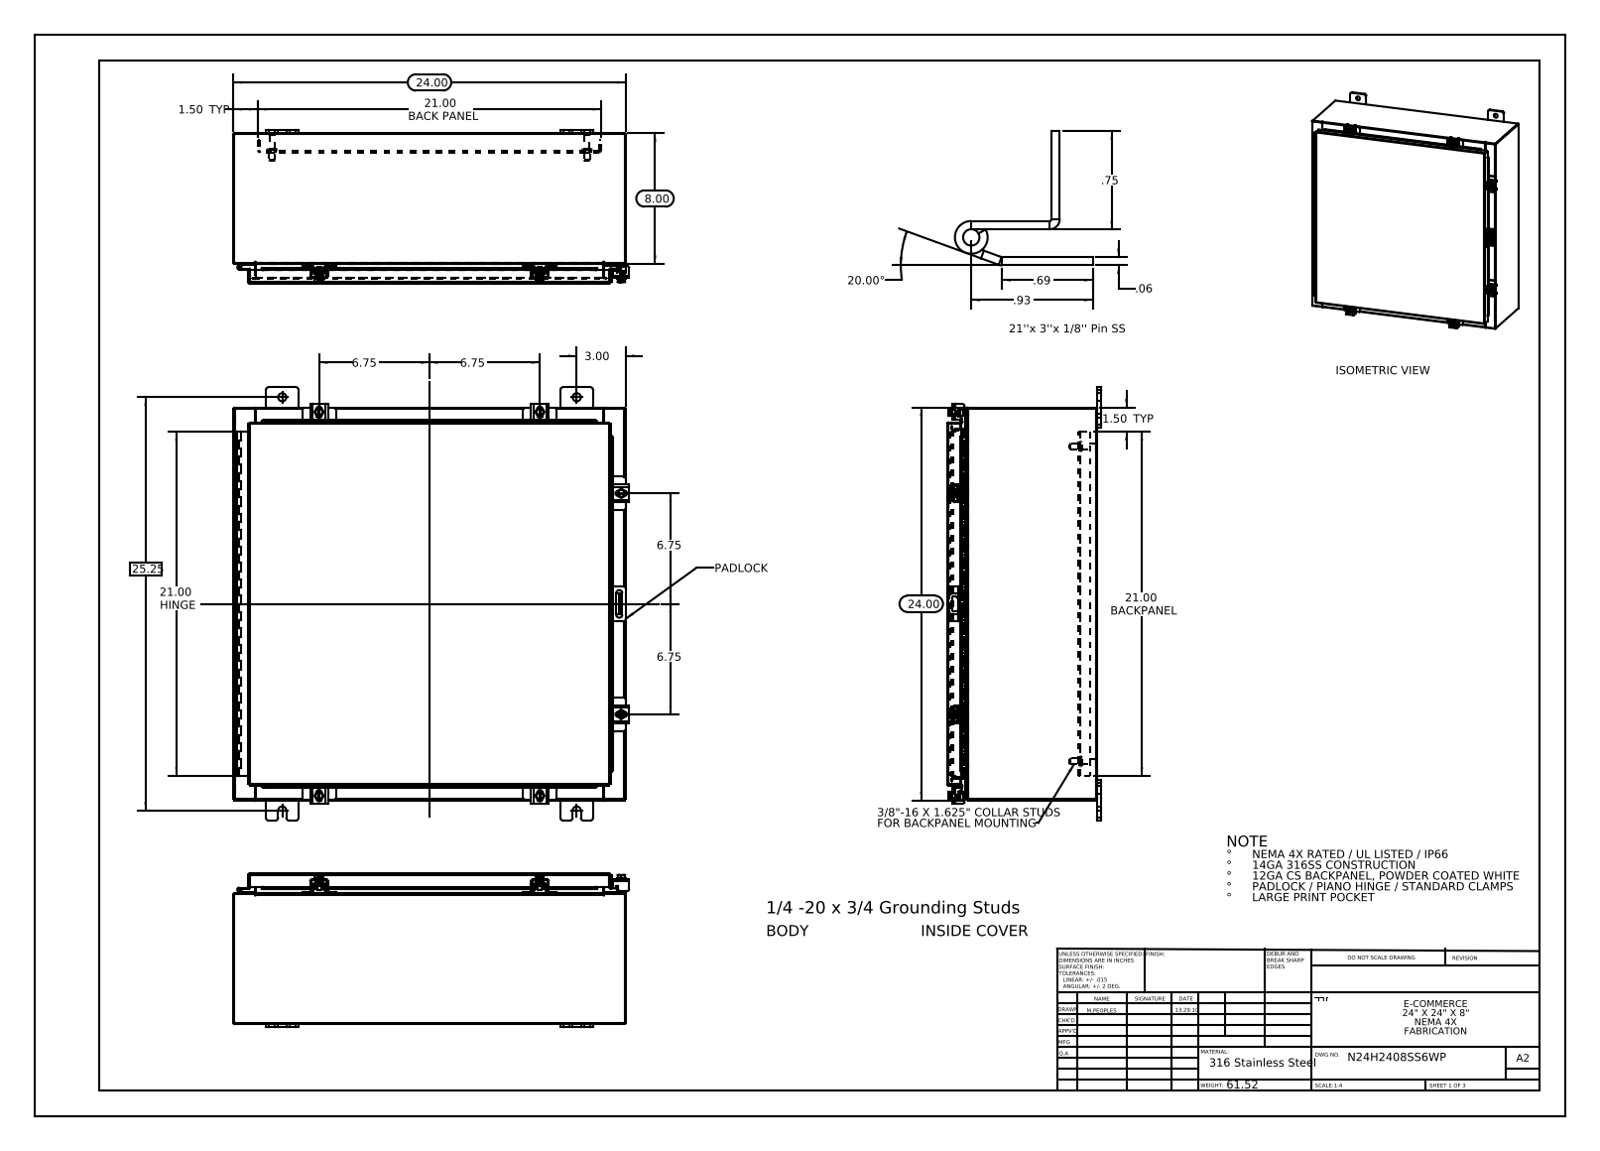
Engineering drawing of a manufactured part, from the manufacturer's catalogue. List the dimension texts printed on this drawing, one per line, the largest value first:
25.25
24.00
24.00
21.00 HINGE
21.00 BACK PANEL
21.00 BACKPANEL
20.00°
8.00
6.75
6.75
6.75
6.75
3.00
1.50 TYP
1.50 TYP
.93
.75
.69
.06
